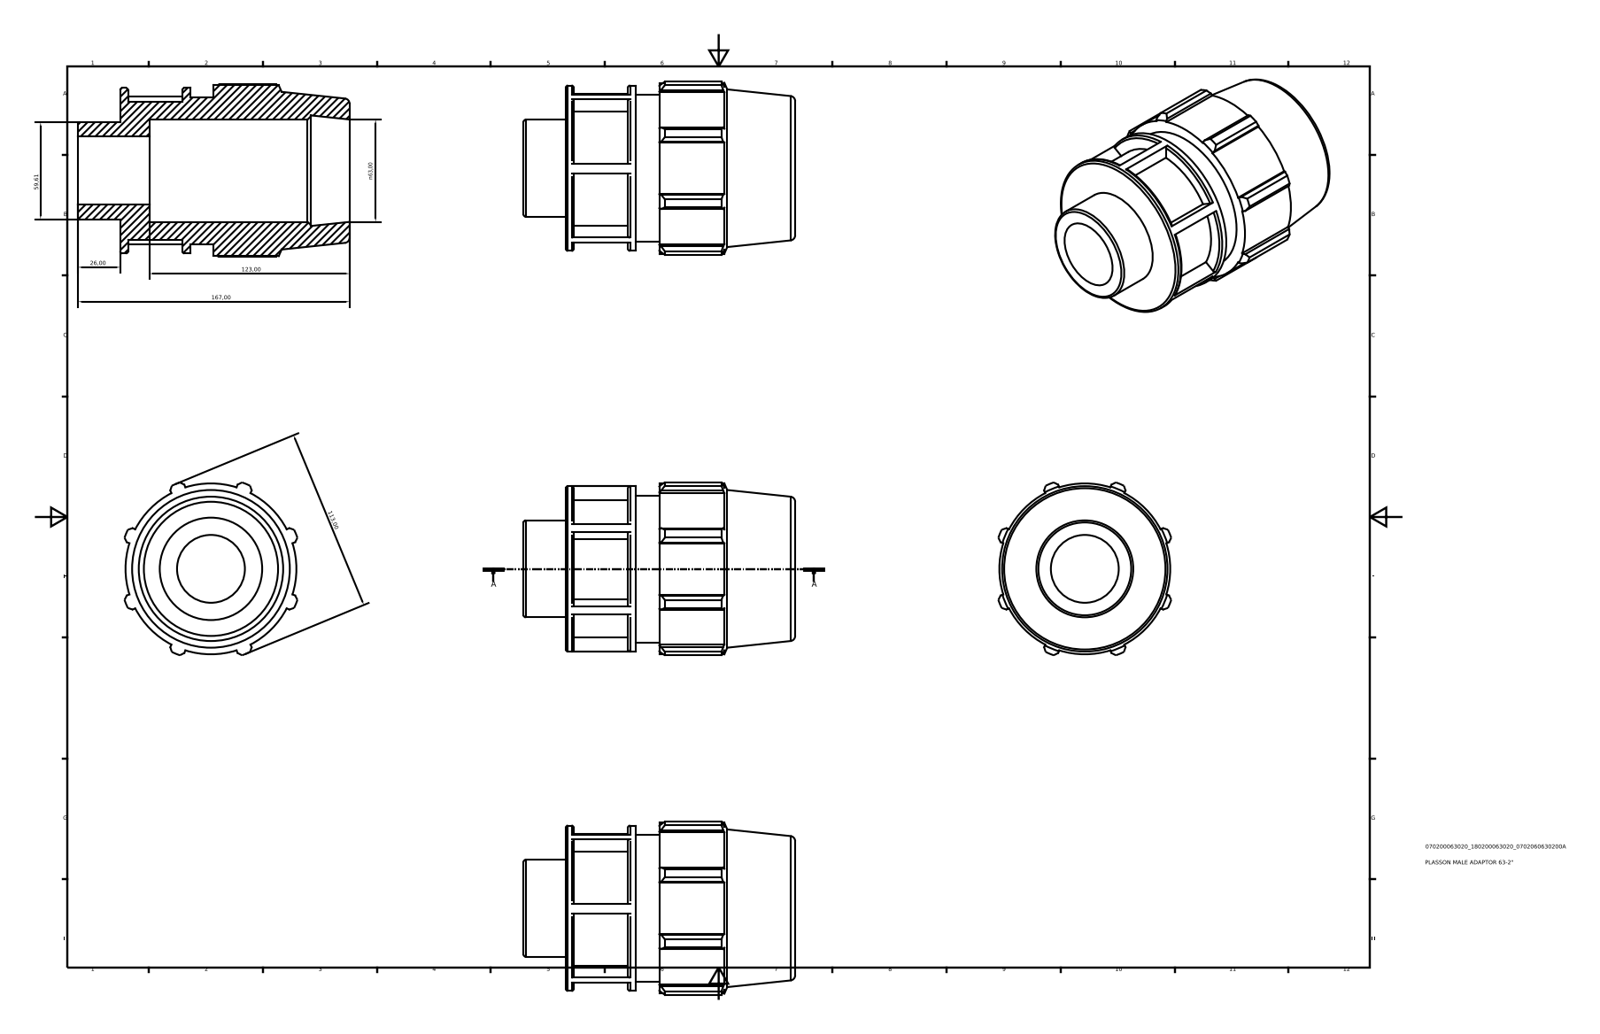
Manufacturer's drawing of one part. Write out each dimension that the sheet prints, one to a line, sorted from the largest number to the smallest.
167,00
123,00
113,00
n63,00
59,61
26,00
